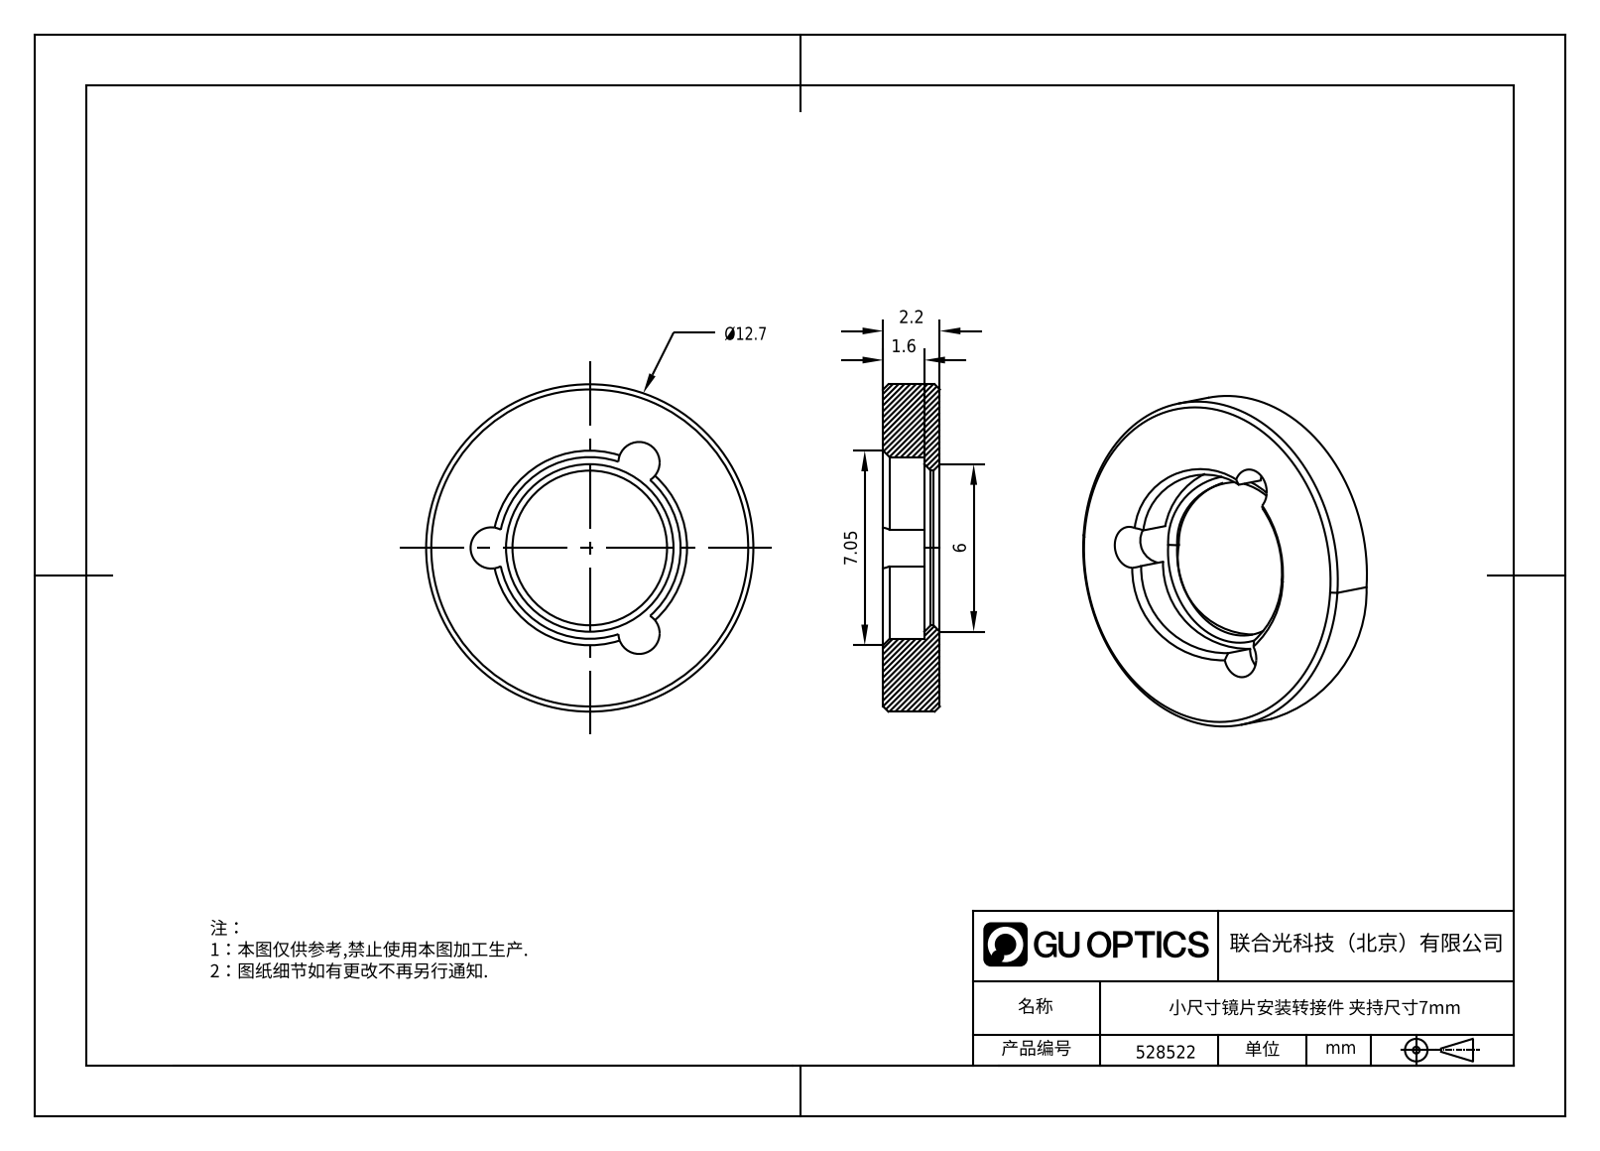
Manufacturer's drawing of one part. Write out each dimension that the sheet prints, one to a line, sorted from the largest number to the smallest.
7.05
6
2.2
1.6
